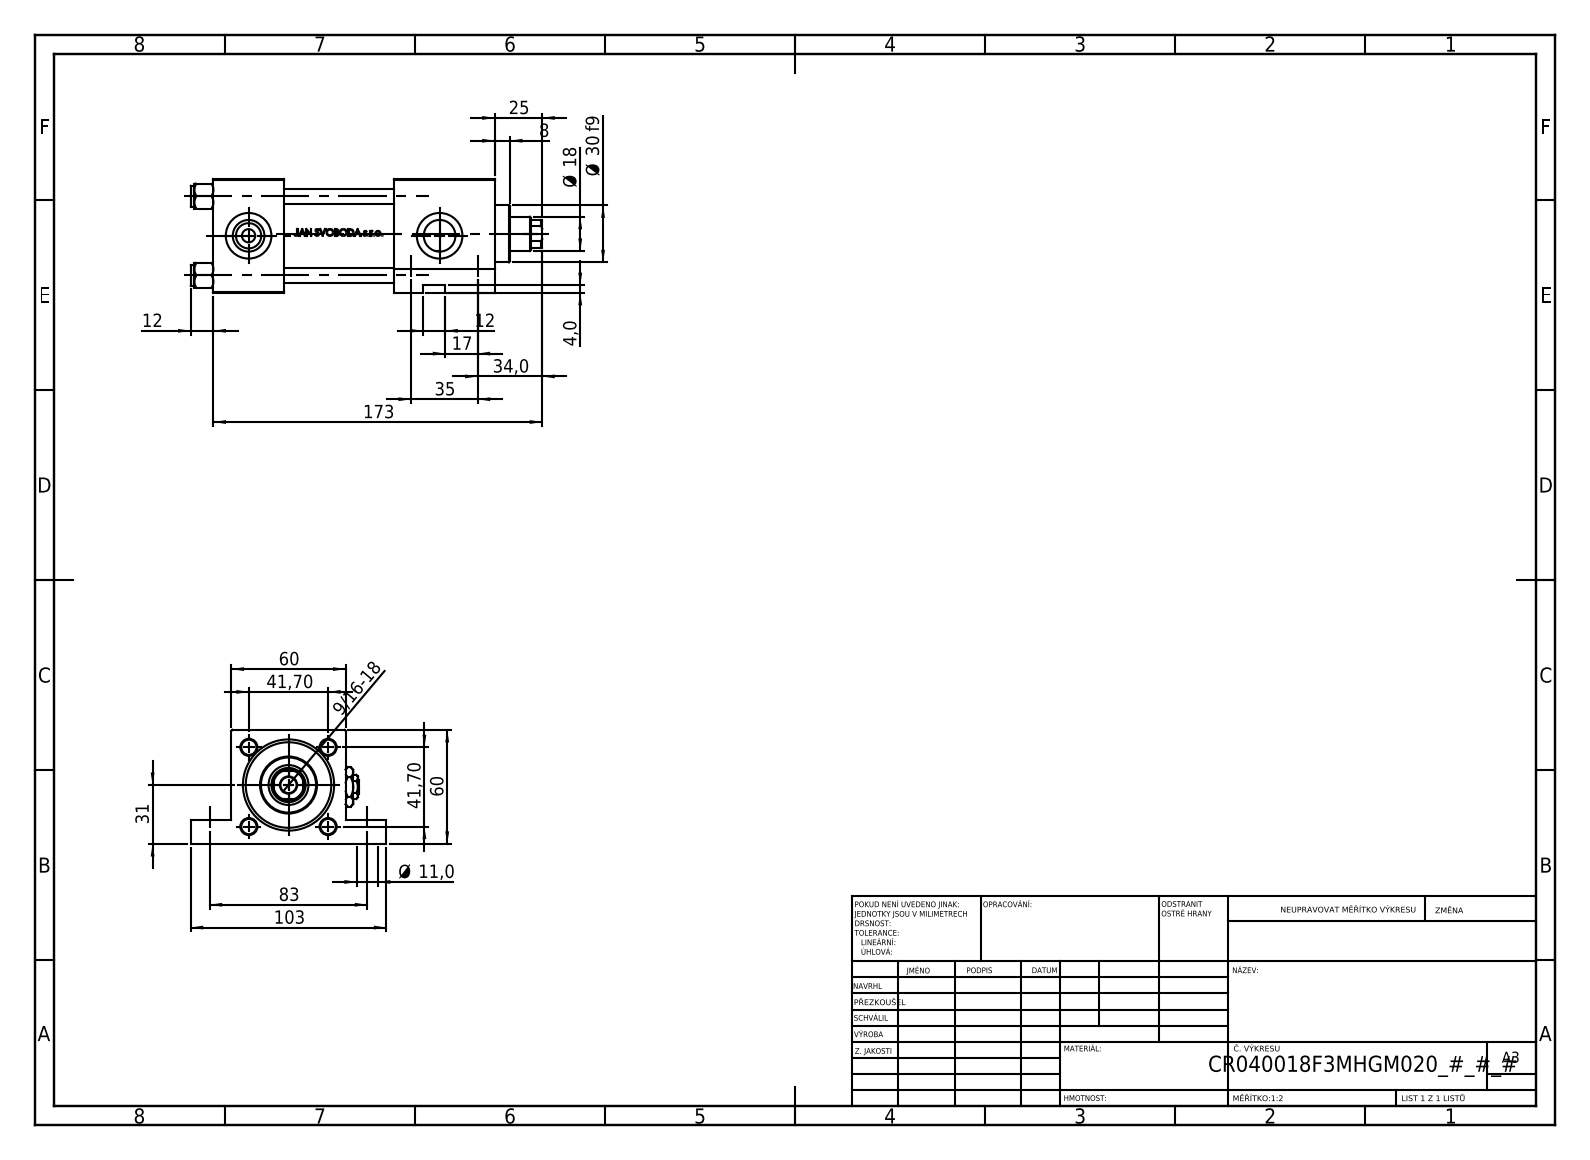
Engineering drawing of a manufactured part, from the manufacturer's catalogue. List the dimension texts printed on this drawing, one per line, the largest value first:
173
103
83
60
60
41,70
41,70
35
34,0
31
Ø 30 f9
25
Ø 18
17
12
12
Ø 11,0
8
4,0
9/16-18
